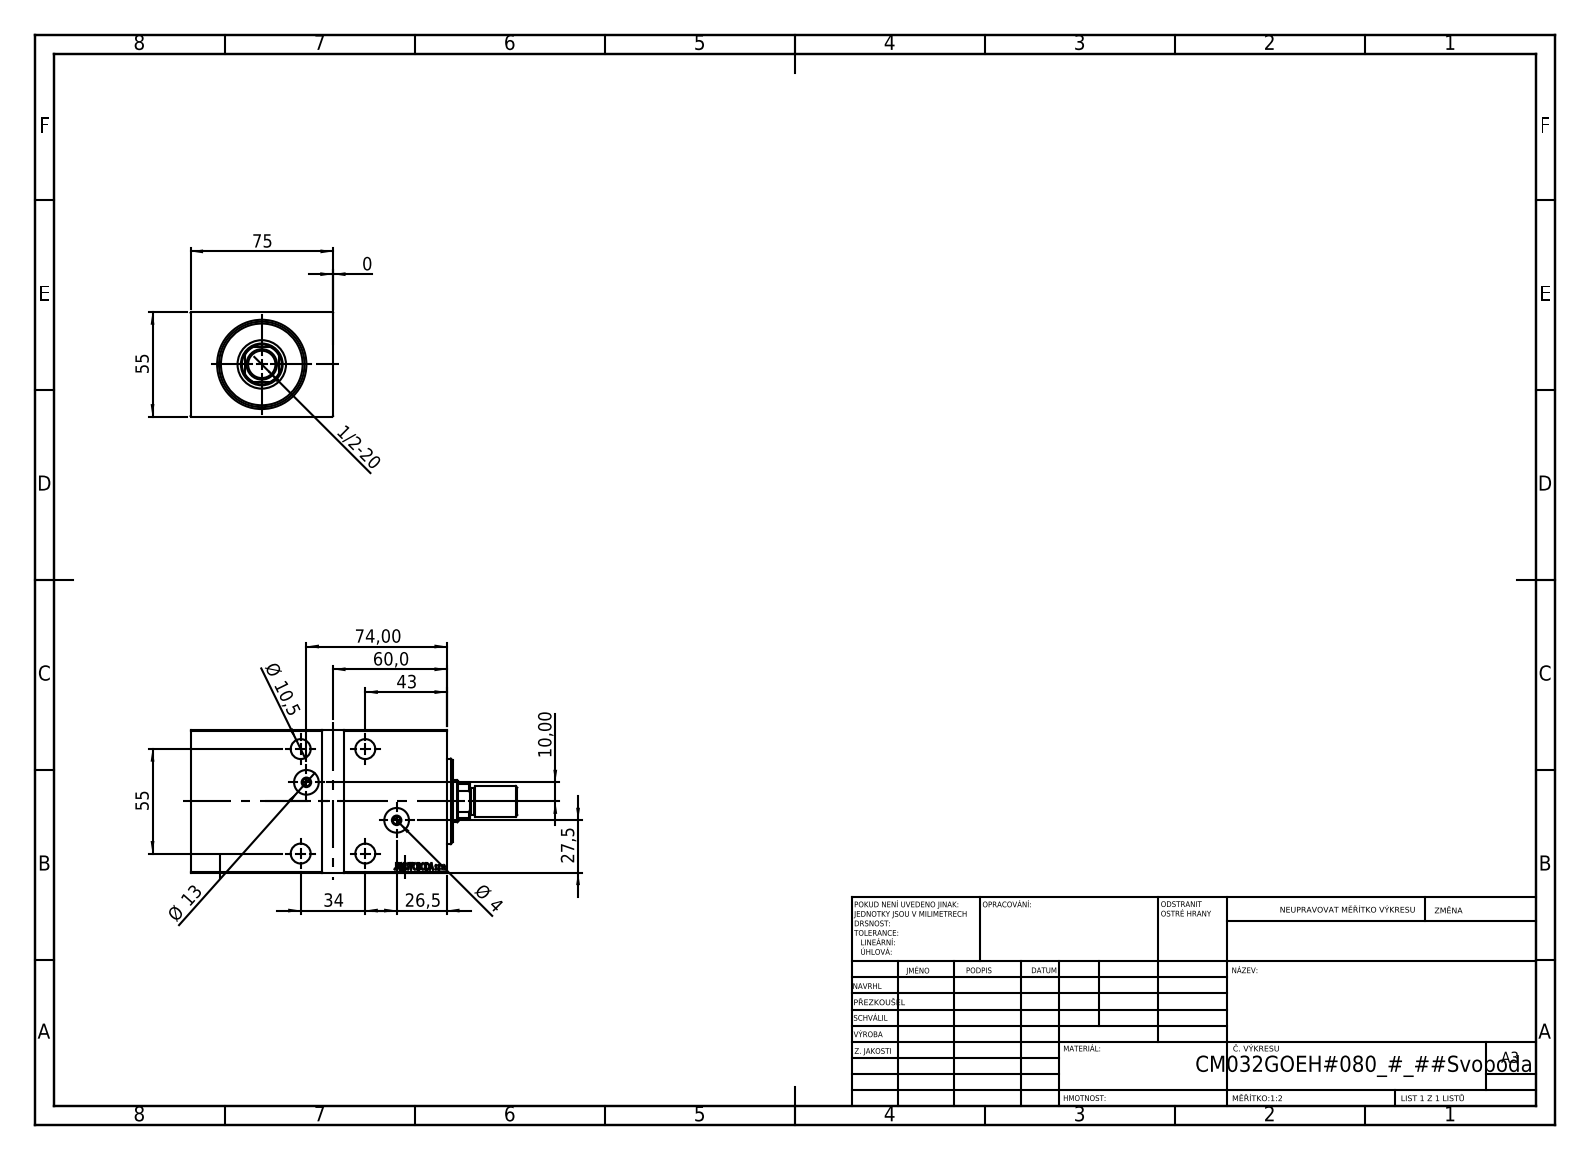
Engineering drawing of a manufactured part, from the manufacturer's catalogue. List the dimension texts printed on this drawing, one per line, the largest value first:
75
74,00
60,0
55
55
43
34
27,5
26,5
Ø 13
Ø 10,5
10,00
Ø 4
1/2-20
0
